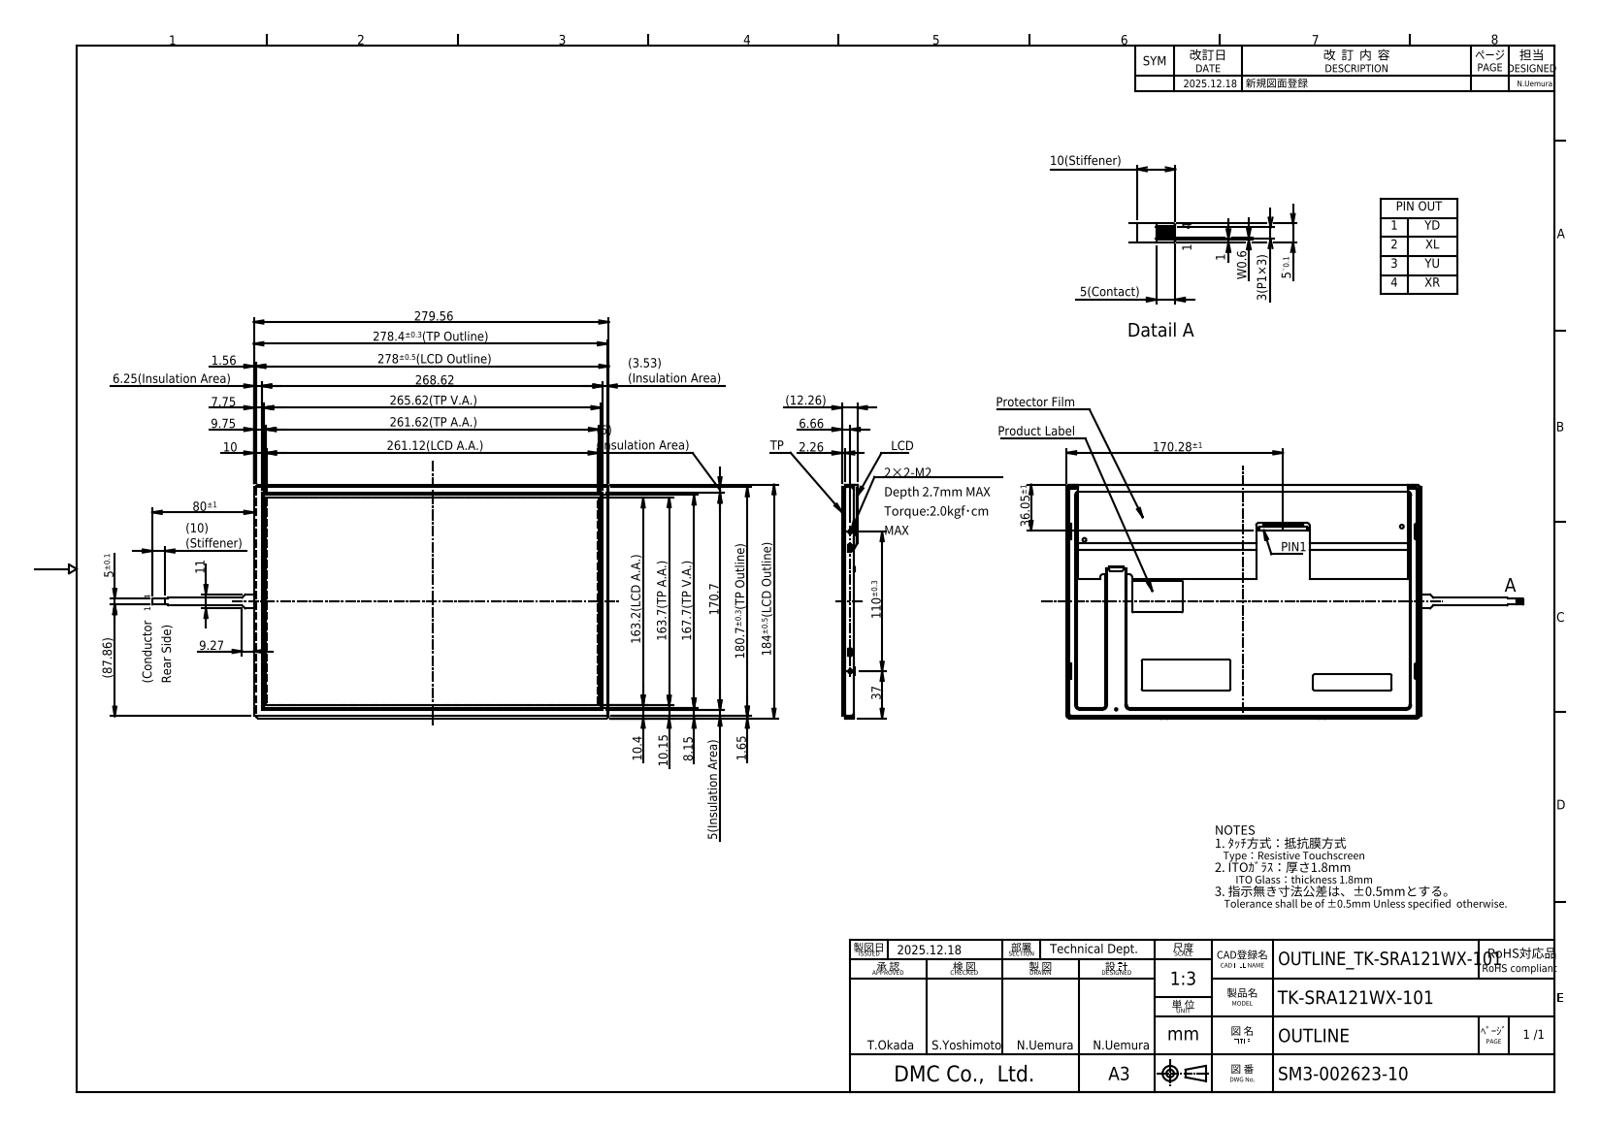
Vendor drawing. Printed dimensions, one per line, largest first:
279.56
278.4±0.3(TP Outline)
278±0.5(LCD Outline)
268.62
265.62(TP V.A.)
261.62(TP A.A.)
261.12(LCD A.A.)
184±0.5(LCD Outline)
180.7±0.3(TP Outline)
170.7
170.28±1
167.7(TP V.A.)
163.7(TP A.A.)
163.2(LCD A.A.)
110±0.3
(87.86)
80±1
37
36.05±1
(12.26)
11
10.4
10.15
(10) (Stiffener)
10
9.75
9.27
8.15
7.75
6.66
6.25(Insulation Area)
5±0.1
5(Insulation Area)
(5) (Insulation Area)
(3.53) (Insulation Area)
2.26
1.65
1.56
